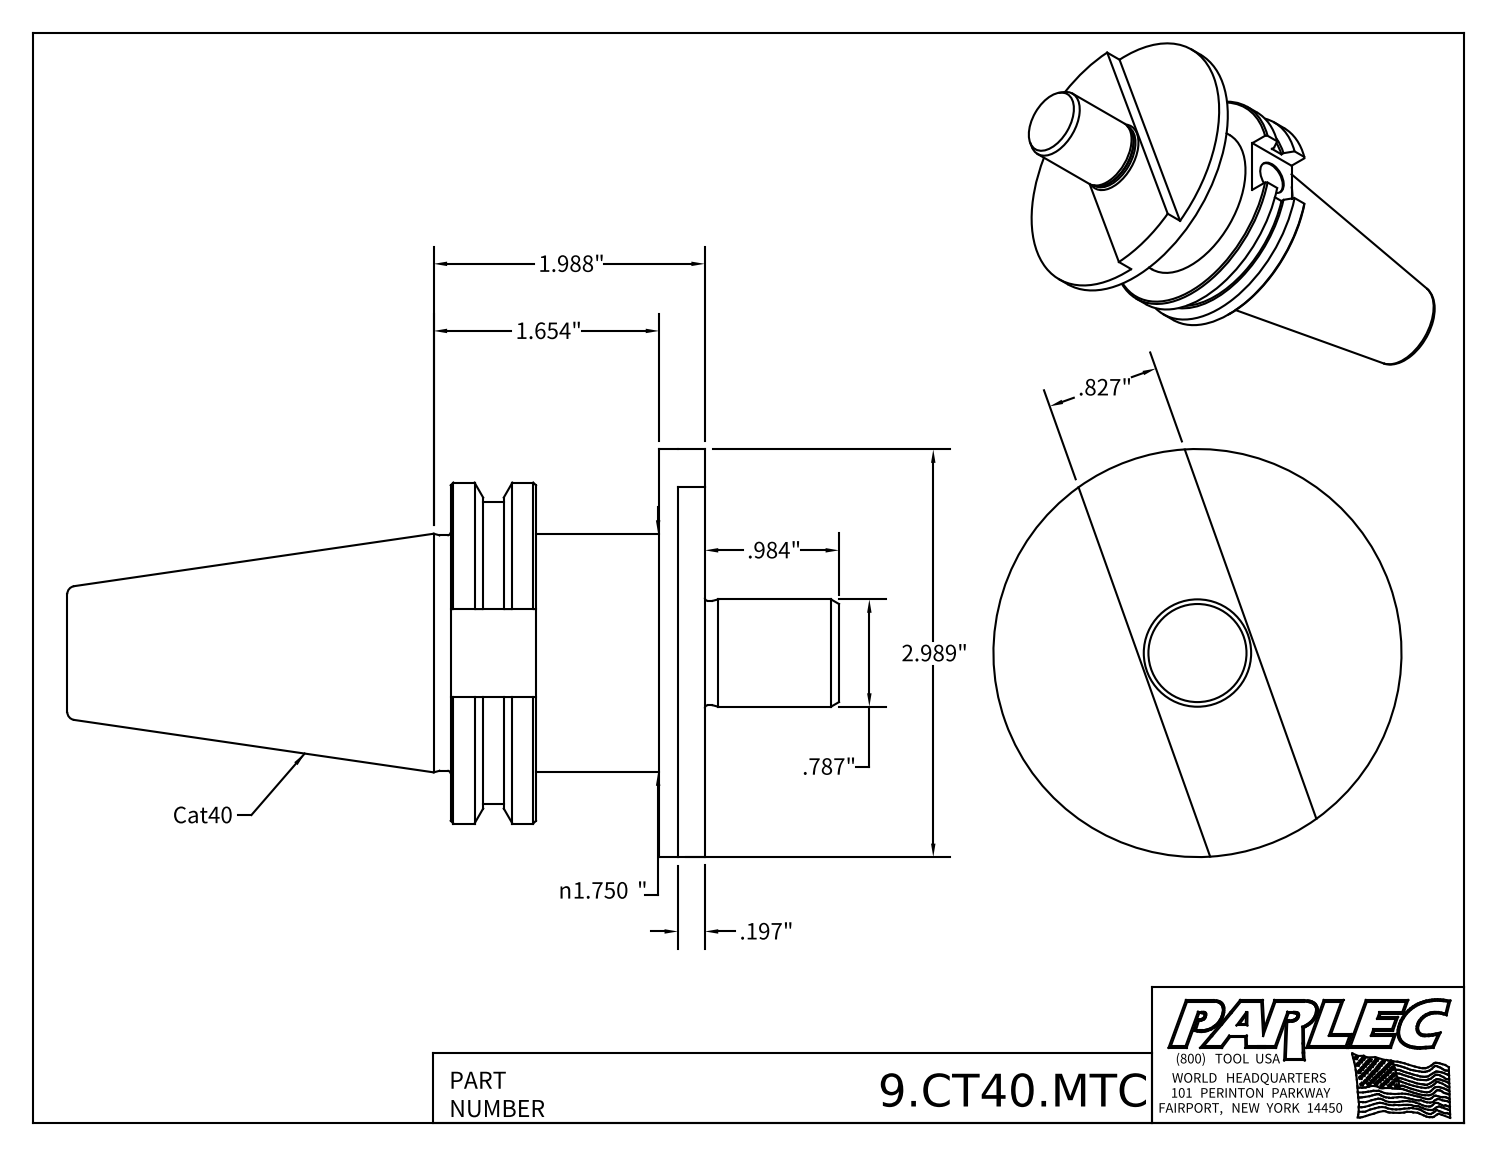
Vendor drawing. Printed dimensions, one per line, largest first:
2.989"
1.988"
n1.750"
1.654"
.984"
.827"
.787"
.197"
